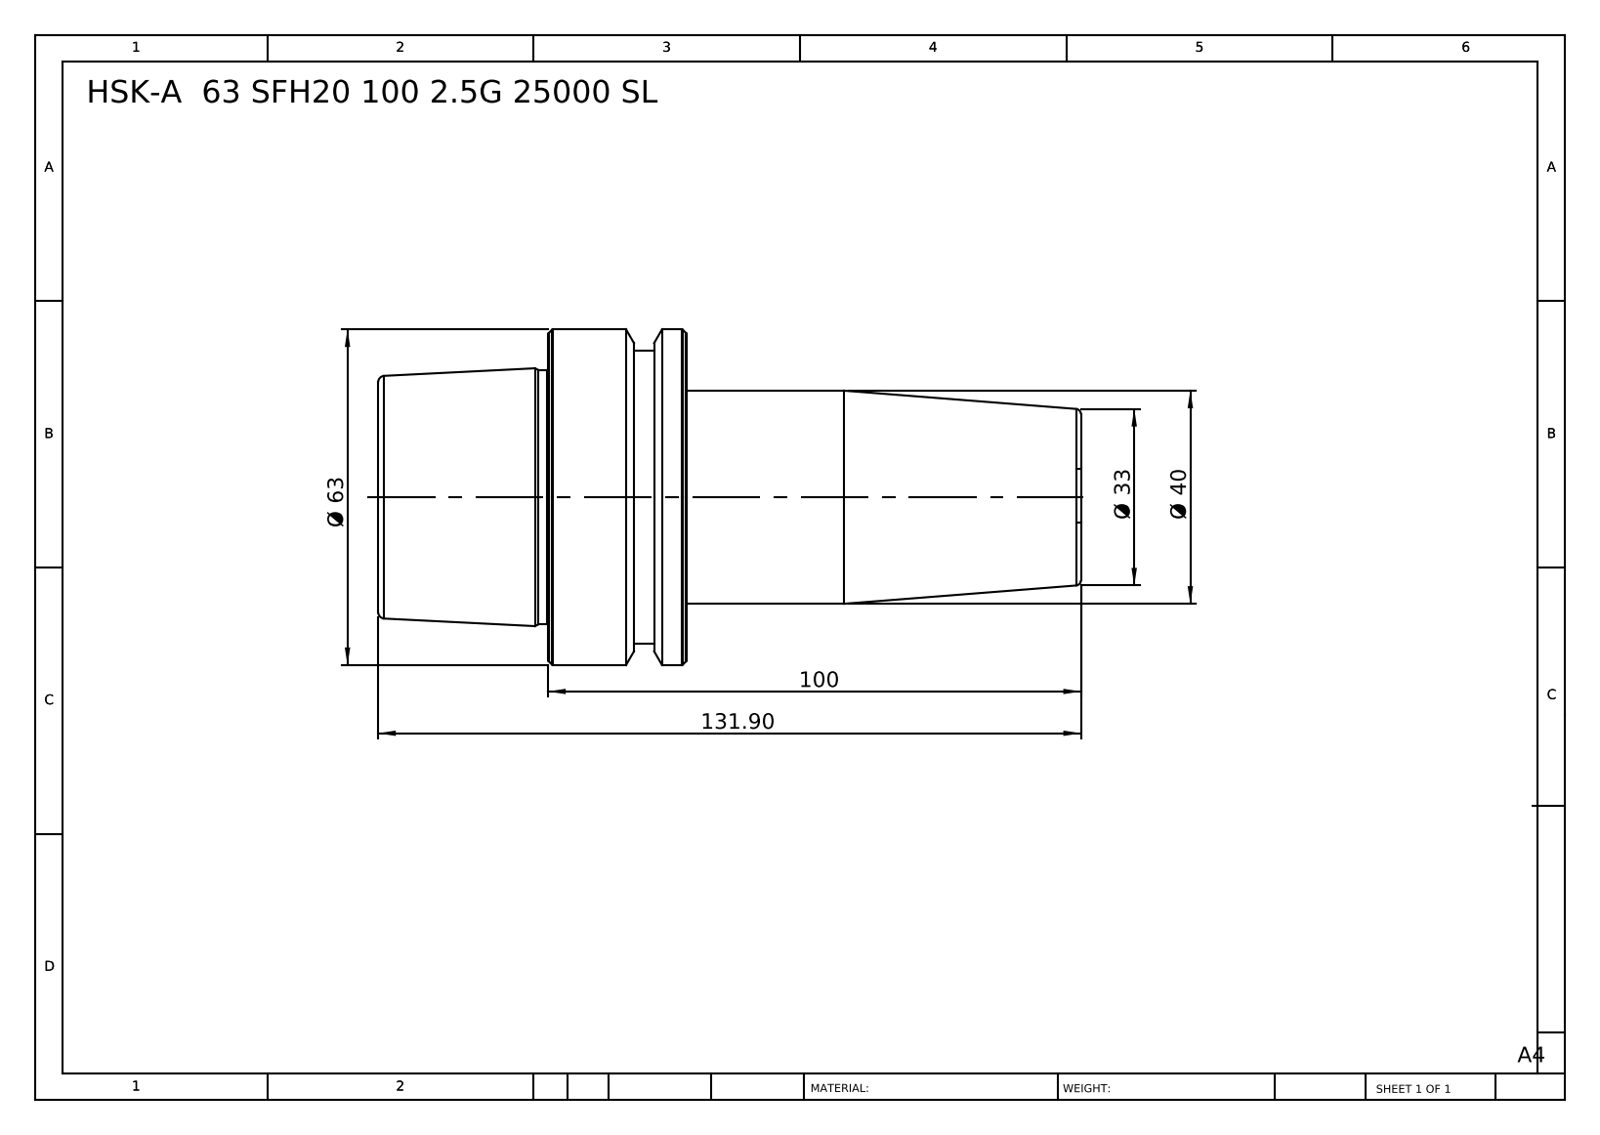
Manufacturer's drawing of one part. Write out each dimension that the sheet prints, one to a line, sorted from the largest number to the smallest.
131.90
100
Ø 63
Ø 40
Ø 33
